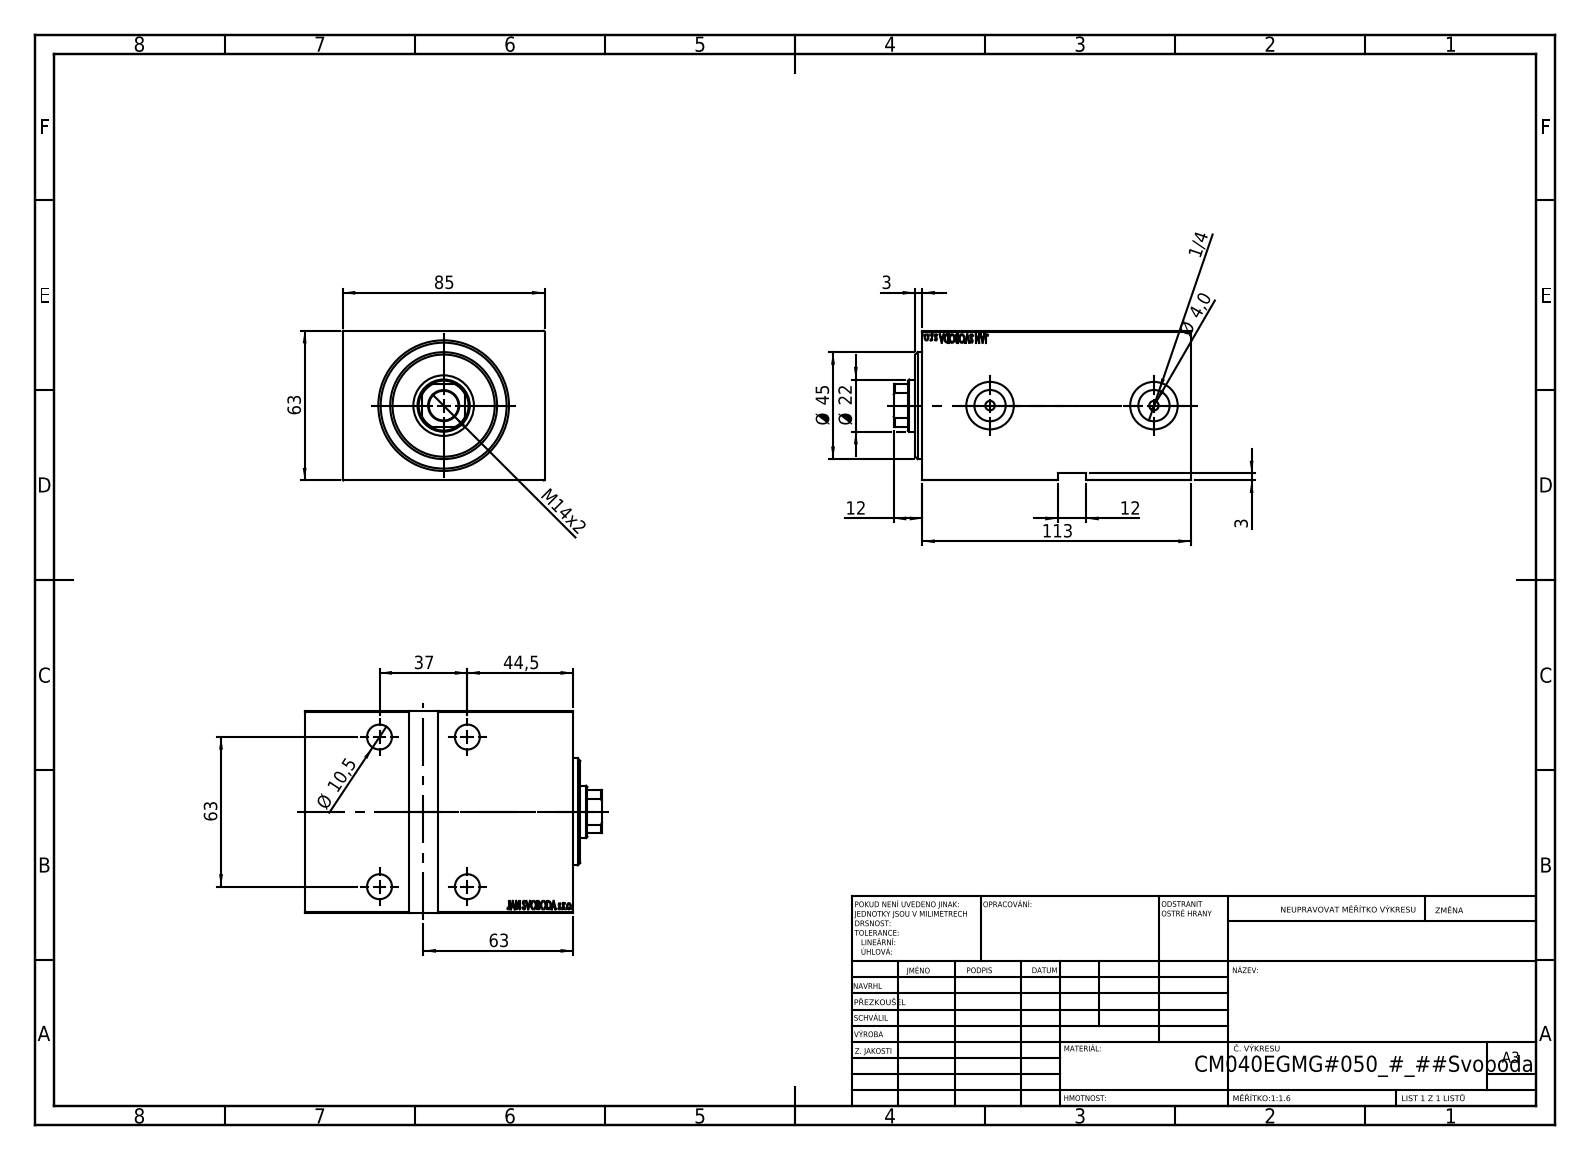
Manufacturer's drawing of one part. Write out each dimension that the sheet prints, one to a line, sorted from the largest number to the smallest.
113
85
63
63
63
Ø 45
44,5
37
Ø 22
M14x2
12
12
Ø 10,5
Ø 4,0
3
3
1/4
